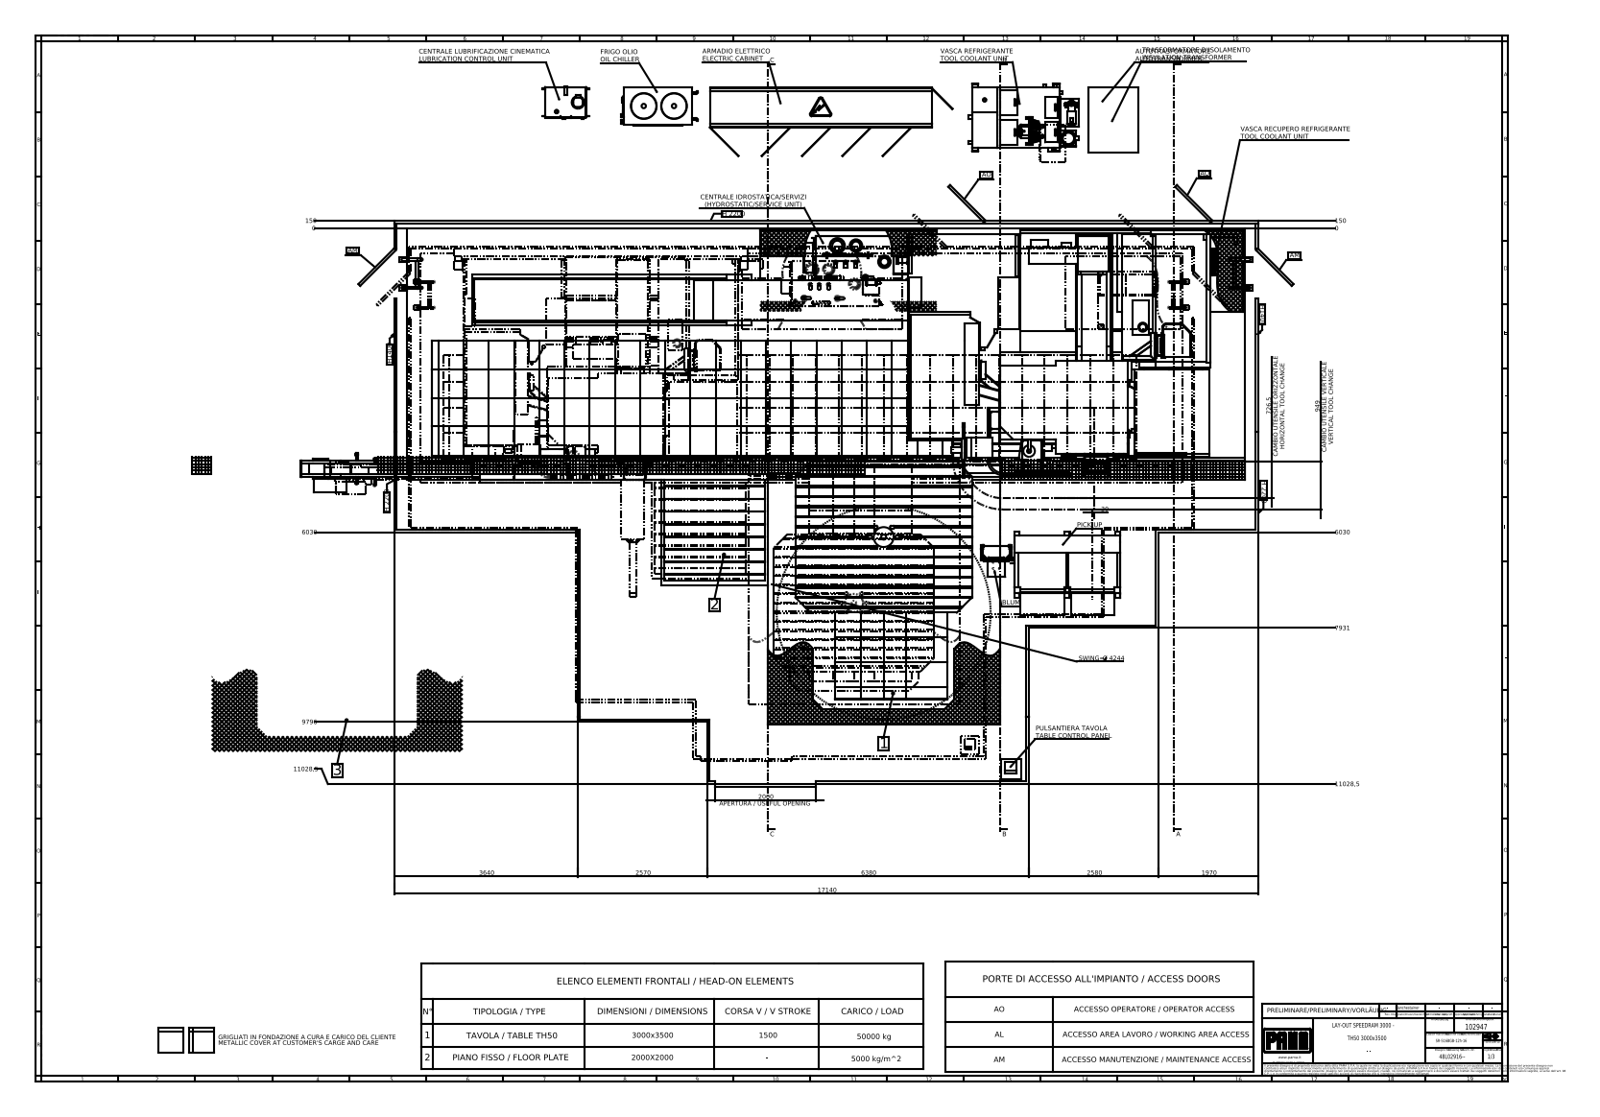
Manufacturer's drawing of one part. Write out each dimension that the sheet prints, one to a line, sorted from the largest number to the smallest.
17140
11028,5
11028,5
9796
7931
6380
6030
6030
SWING= Ø 4244
3640
2580
2570
2000 APERTURA / USEFUL OPENING
1970
949 CAMBIO UTENSILE VERTICALE VERTICAL TOOL CHANGE
726,5 CAMBIO UTENSILE ORIZZONTALE HORIZONTAL TOOL CHANGE
150
150
30
0
0
